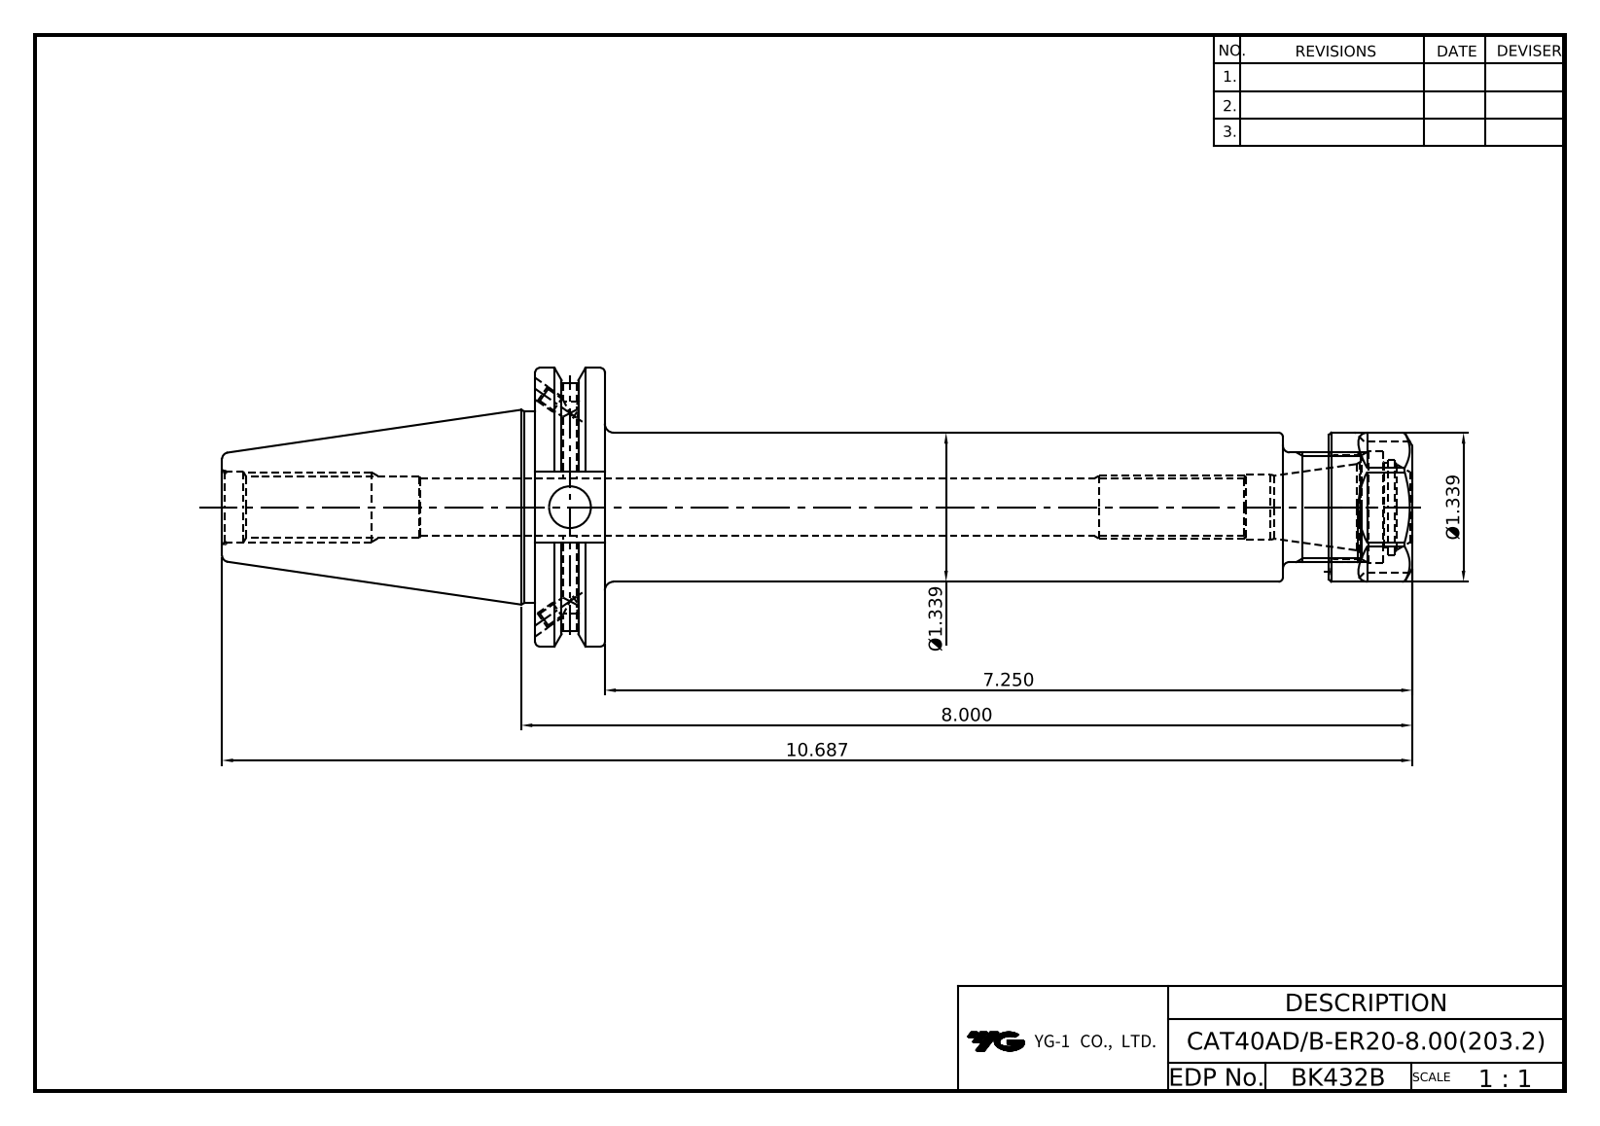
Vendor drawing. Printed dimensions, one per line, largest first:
10.687
8.000
7.250
Ø1.339
Ø1.339
